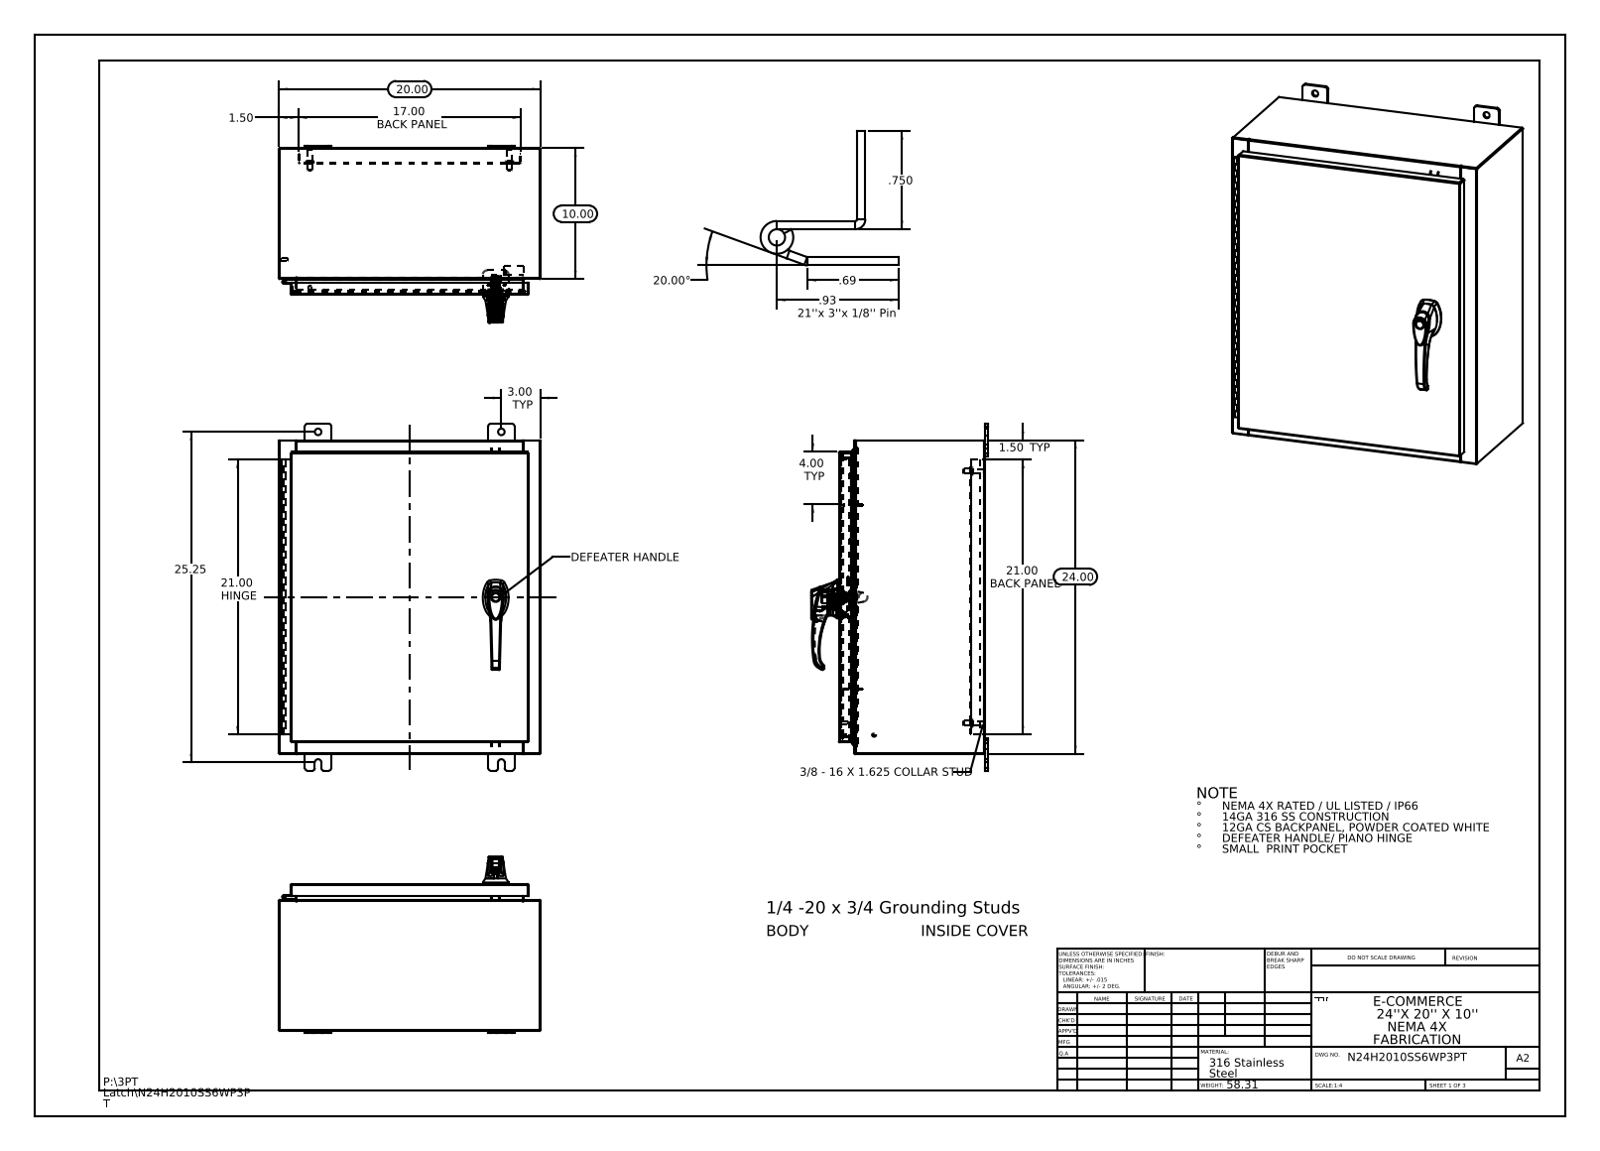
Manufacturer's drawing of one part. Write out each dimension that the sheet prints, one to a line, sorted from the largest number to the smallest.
25.25
24.00
21.00 HINGE
21.00 BACK PANEL
20.00
20.00°
17.00 BACK PANEL
10.00
4.00 TYP
3.00 TYP
1.50
1.50 TYP
.93
.750
.69
